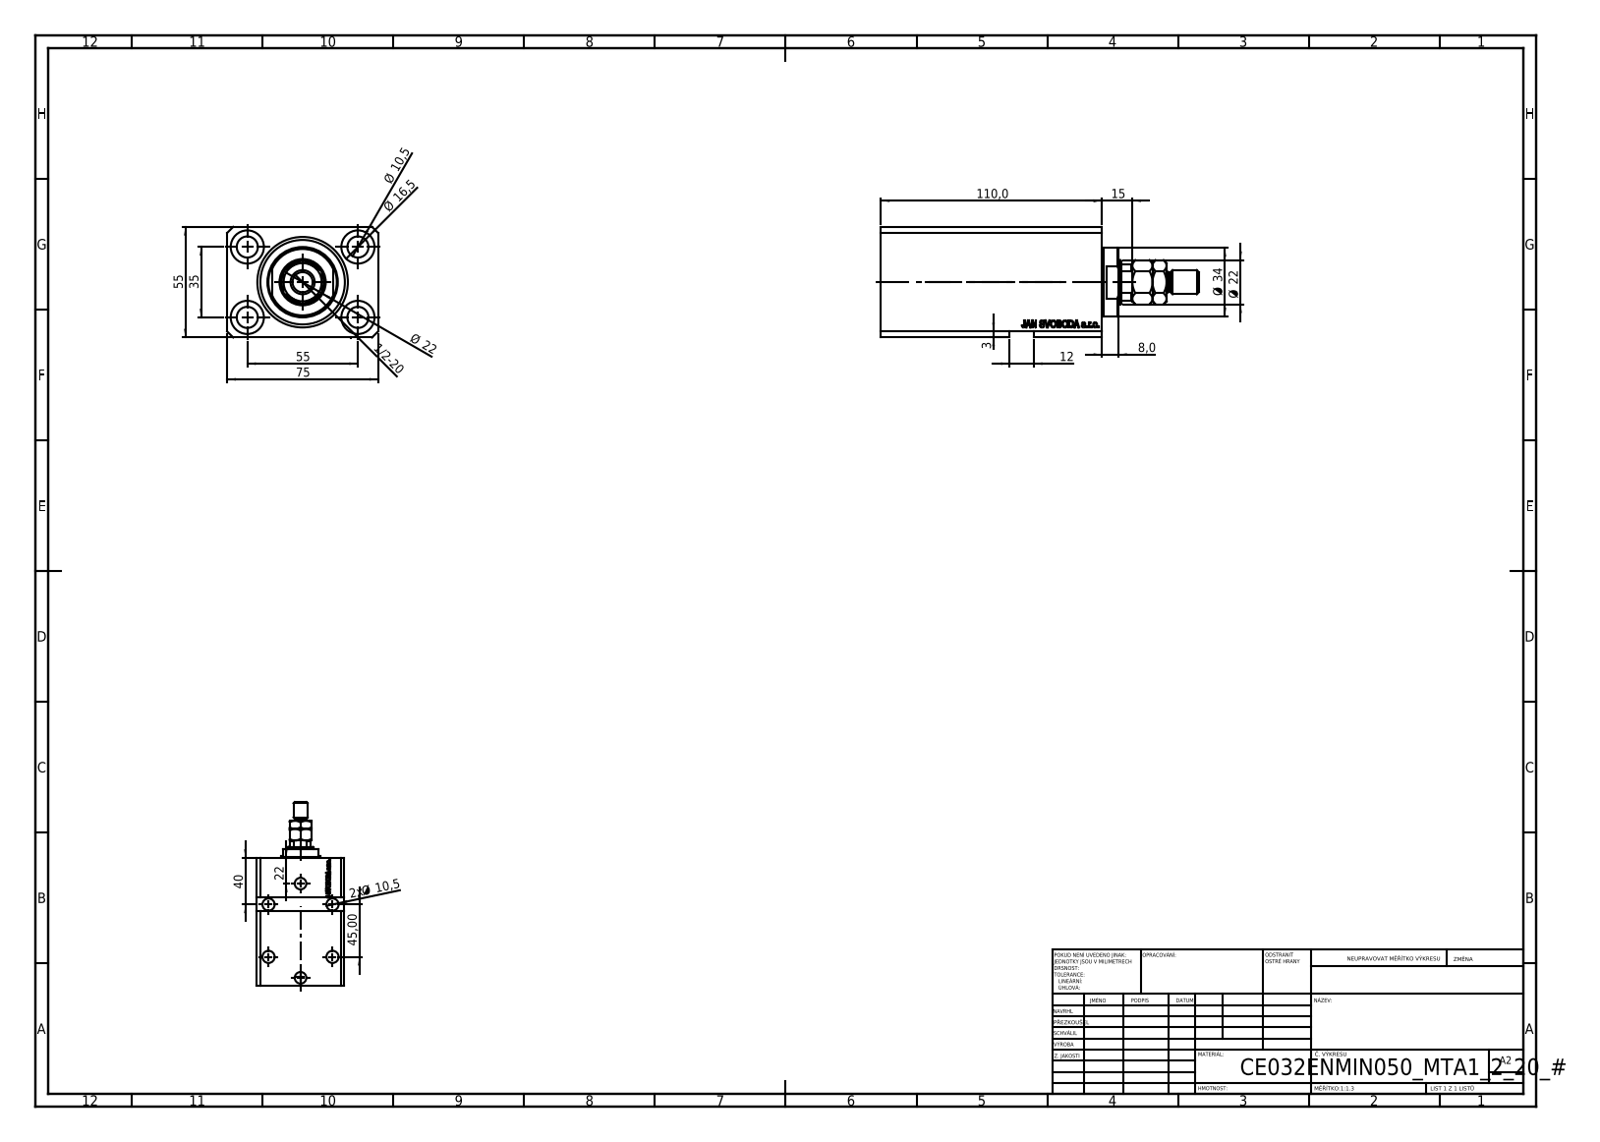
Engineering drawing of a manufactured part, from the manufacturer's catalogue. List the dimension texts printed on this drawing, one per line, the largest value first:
110,0
75
55
55
45,00
40
35
Ø 34
Ø 22
Ø 22
22
Ø 16,5
15
12
Ø 10,5
2x Ø 10,5
8,0
3
1/2-20
